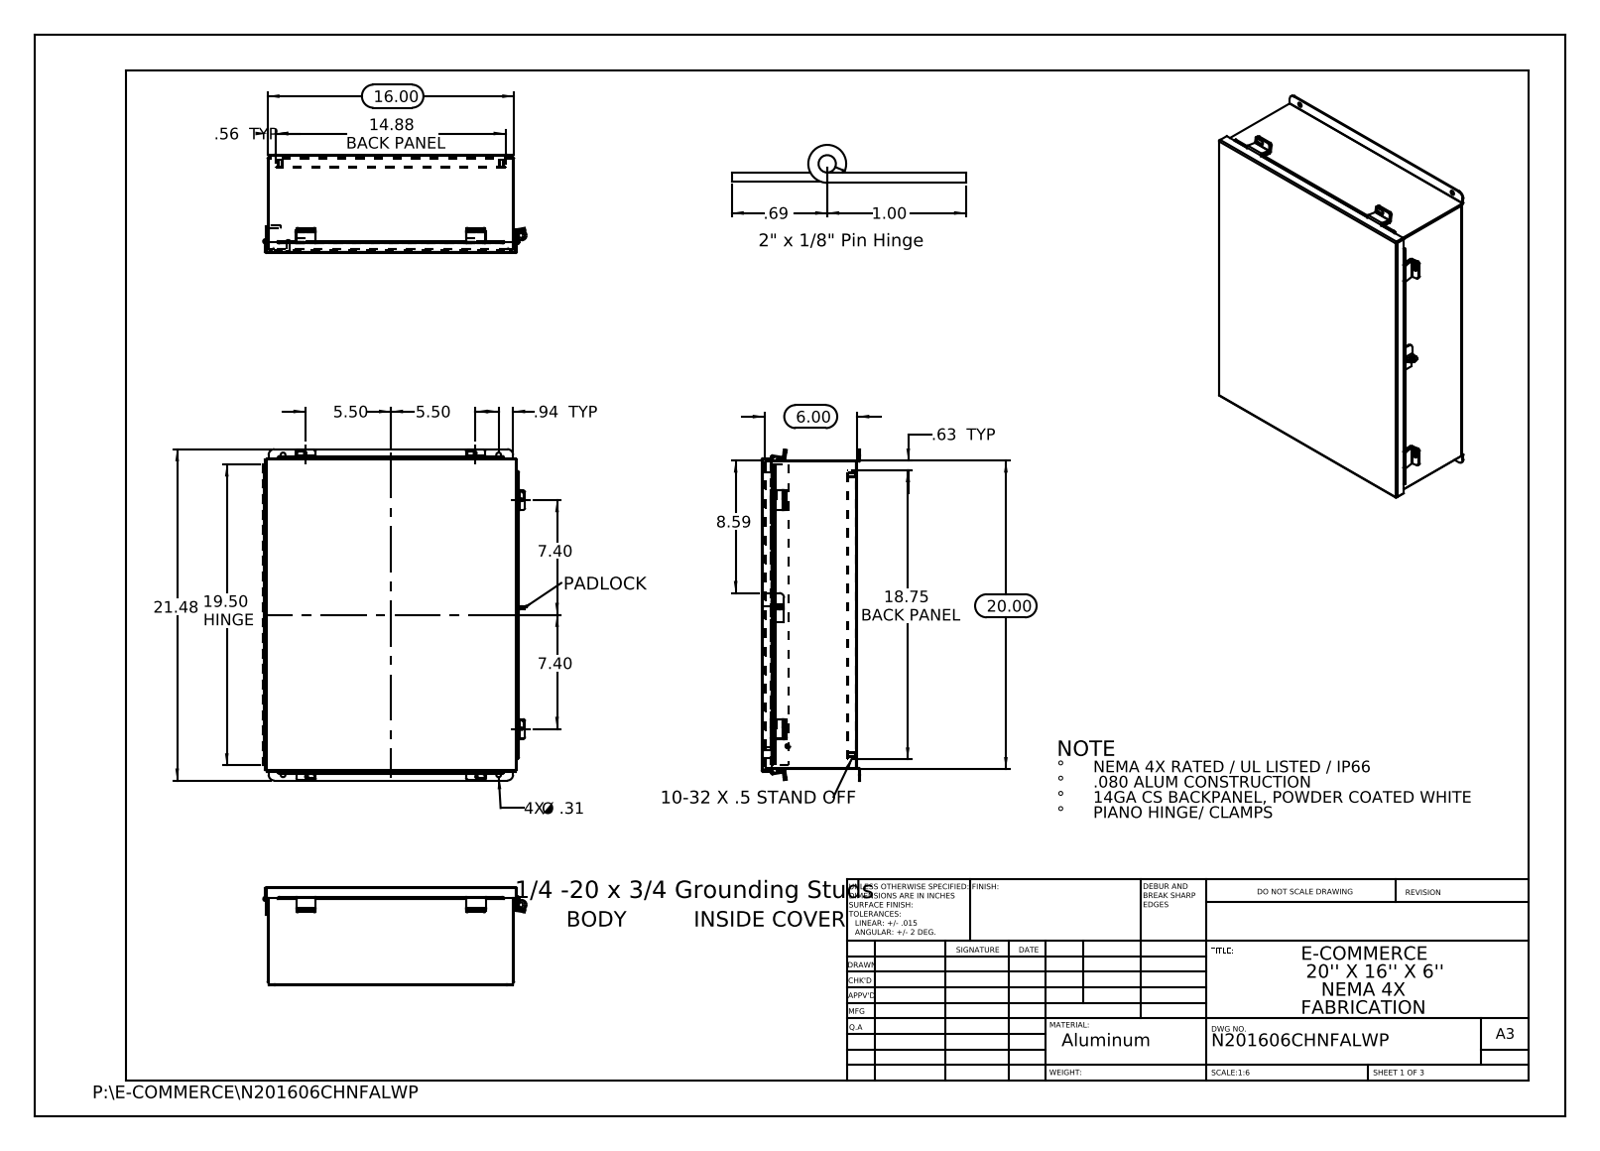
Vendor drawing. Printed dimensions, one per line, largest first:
21.48
20.00
19.50 HINGE
18.75 BACK PANEL
16.00
14.88 BACK PANEL
8.59
7.40
7.40
6.00
5.50
5.50
1.00
.94 TYP
.69
.63 TYP
.56 TYP
4X Ø .31
